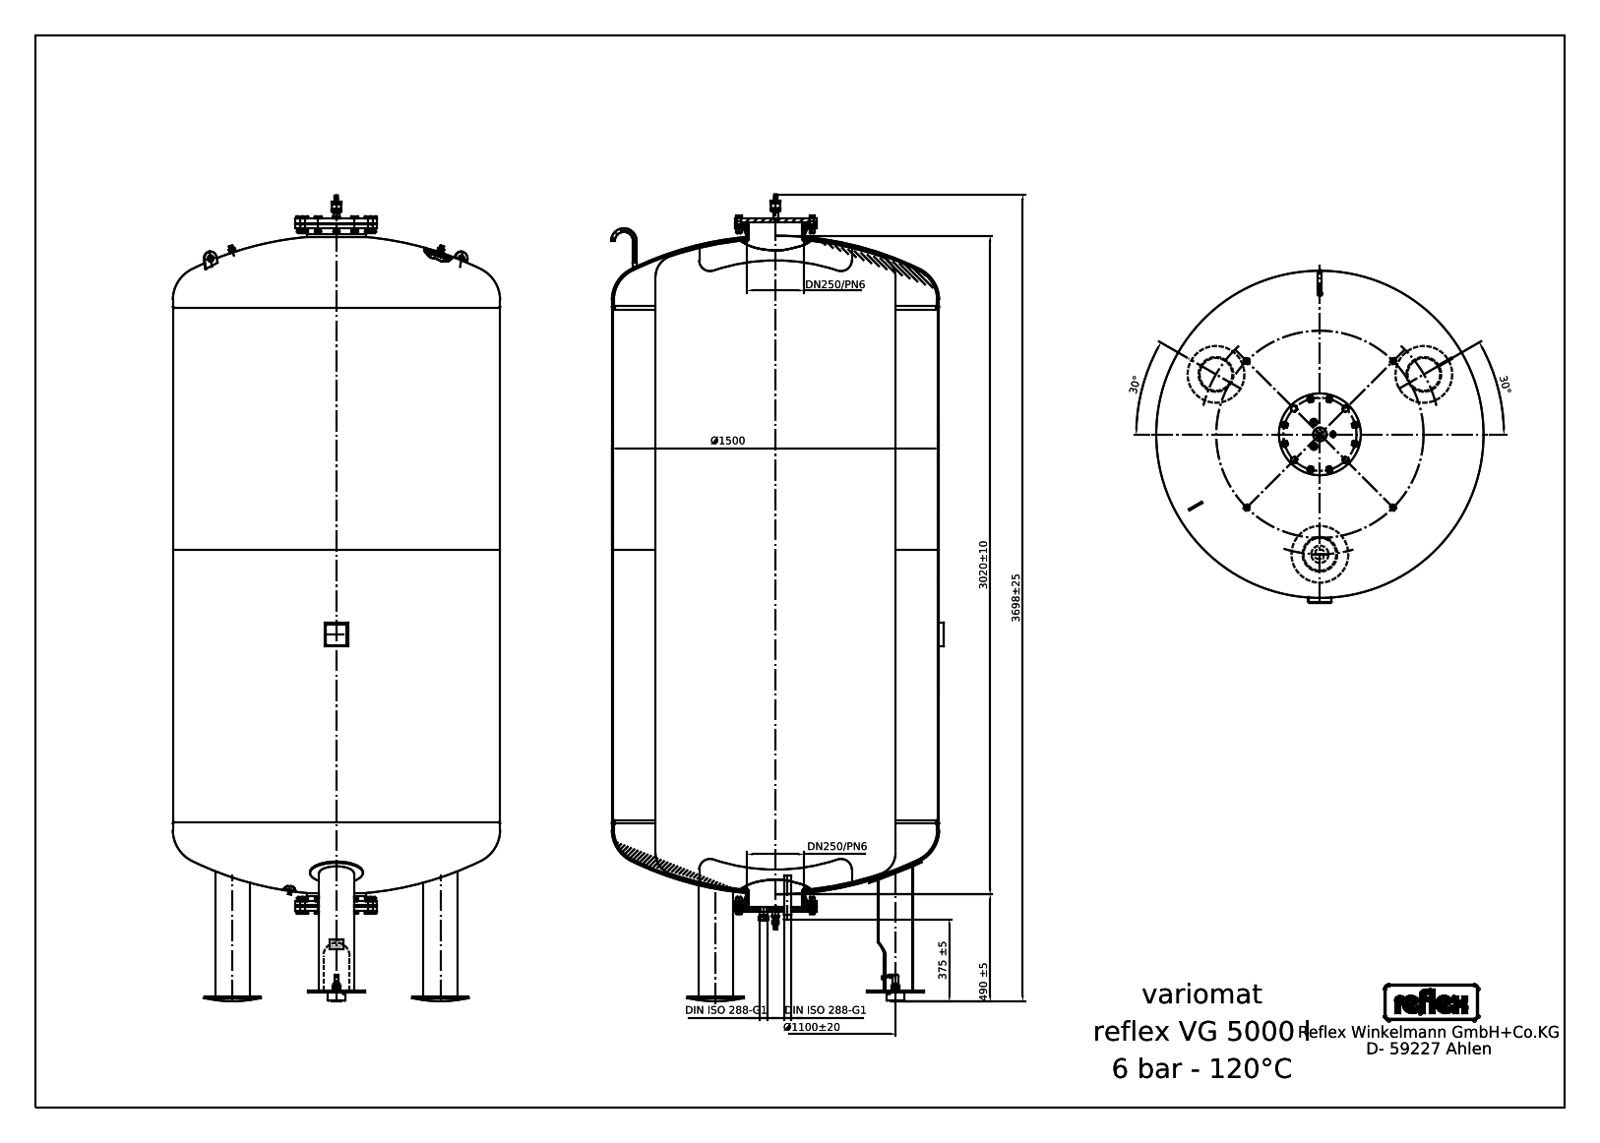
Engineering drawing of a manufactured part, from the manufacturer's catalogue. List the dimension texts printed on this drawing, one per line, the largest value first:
3698±25
3698±25
3020±10
3020±10
Ø1500
Ø1500
Ø1100±20
Ø1100±20
490 ±5
490 ±5
375 ±5
375 ±5
DIN ISO 288-G1
DIN ISO 288-G1
DIN ISO 288-G1
DIN ISO 288-G1
DN250/PN6
DN250/PN6
DN250/PN6
DN250/PN6
30°
30°
30°
30°
